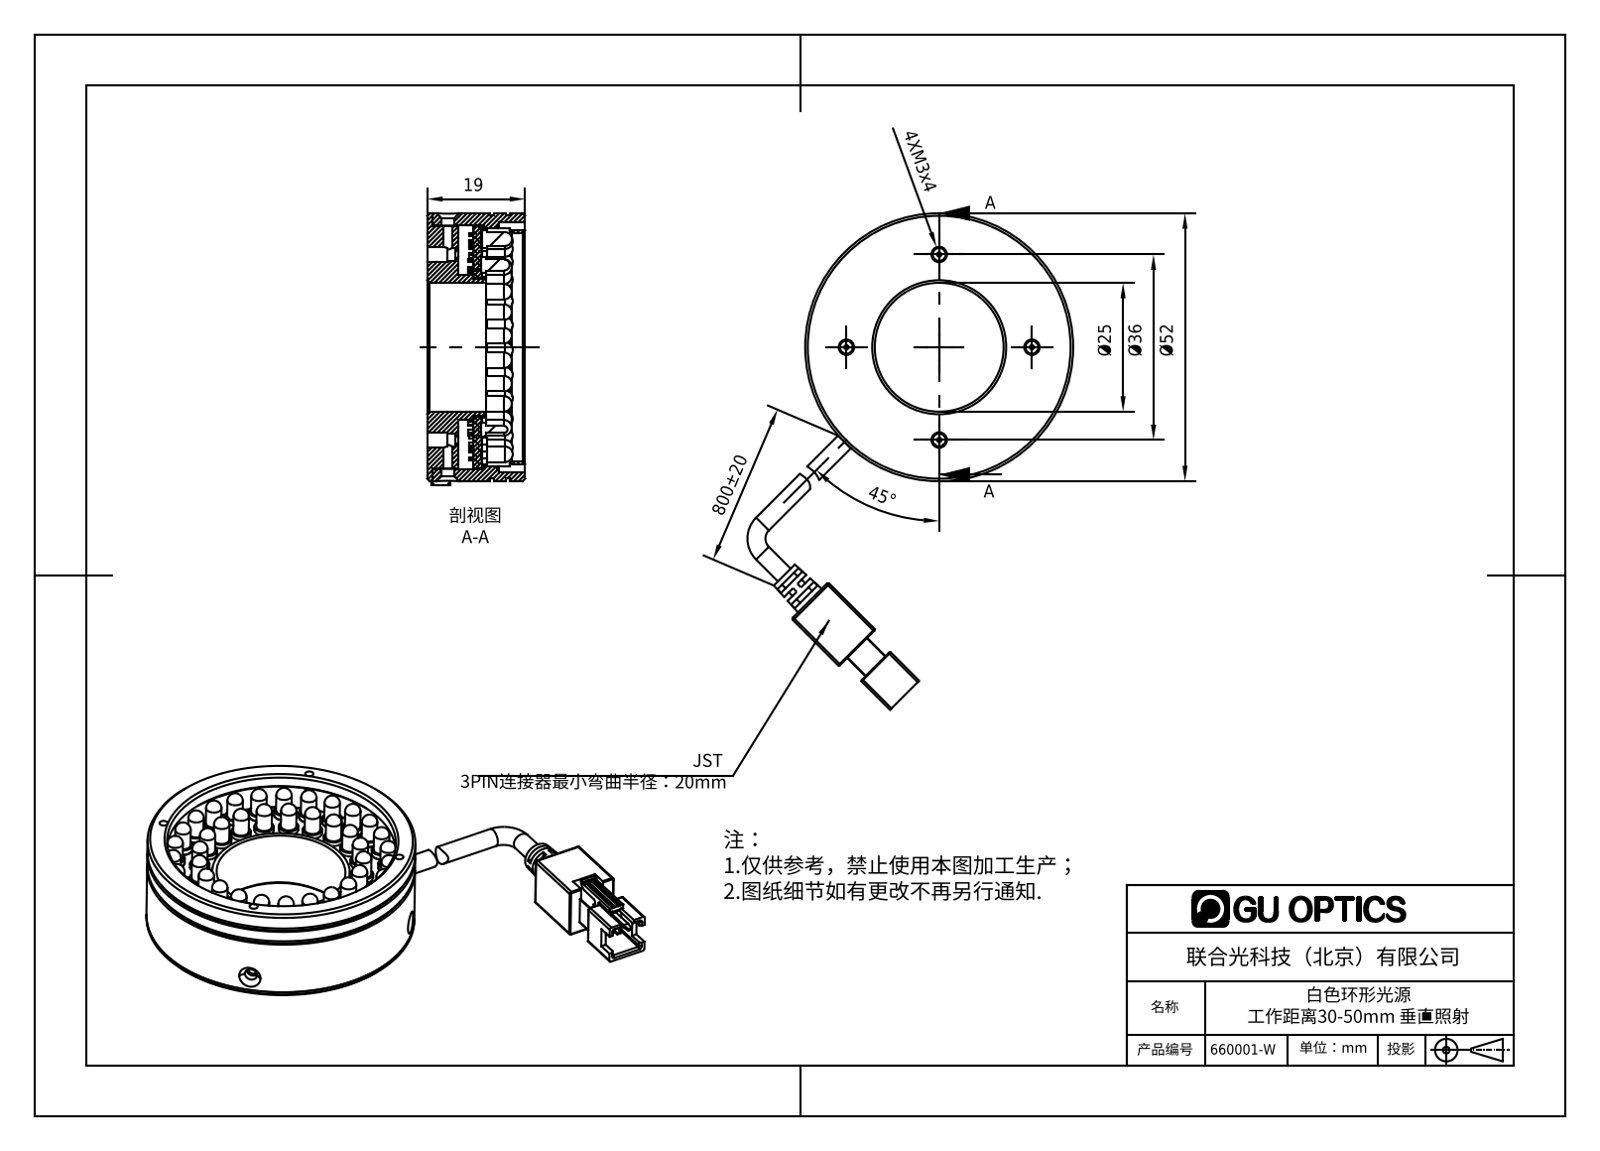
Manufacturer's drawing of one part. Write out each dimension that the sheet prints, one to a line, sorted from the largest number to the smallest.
800±20
Ø52
45°
Ø36
Ø25
19
4XM3x4
